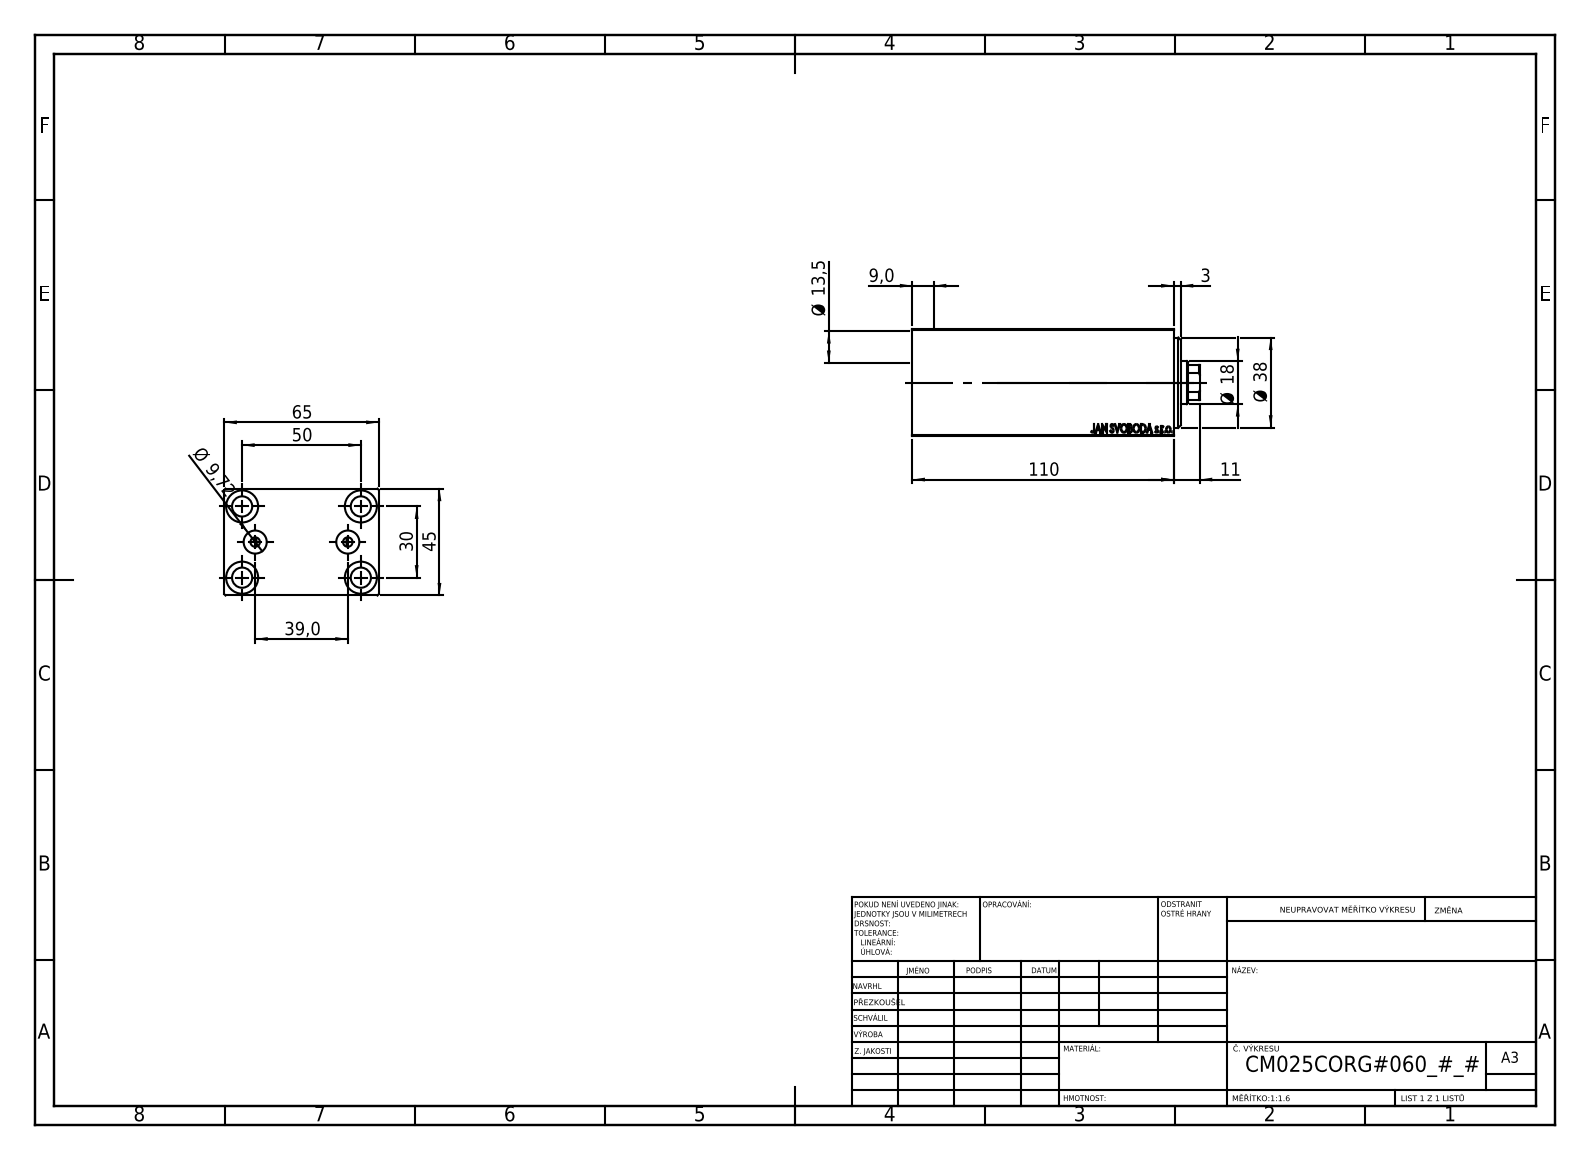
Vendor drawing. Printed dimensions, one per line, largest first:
110
65
50
45
39,0
Ø 38
30
Ø 18
Ø 13,5
11
Ø 9,72
9,0
3
